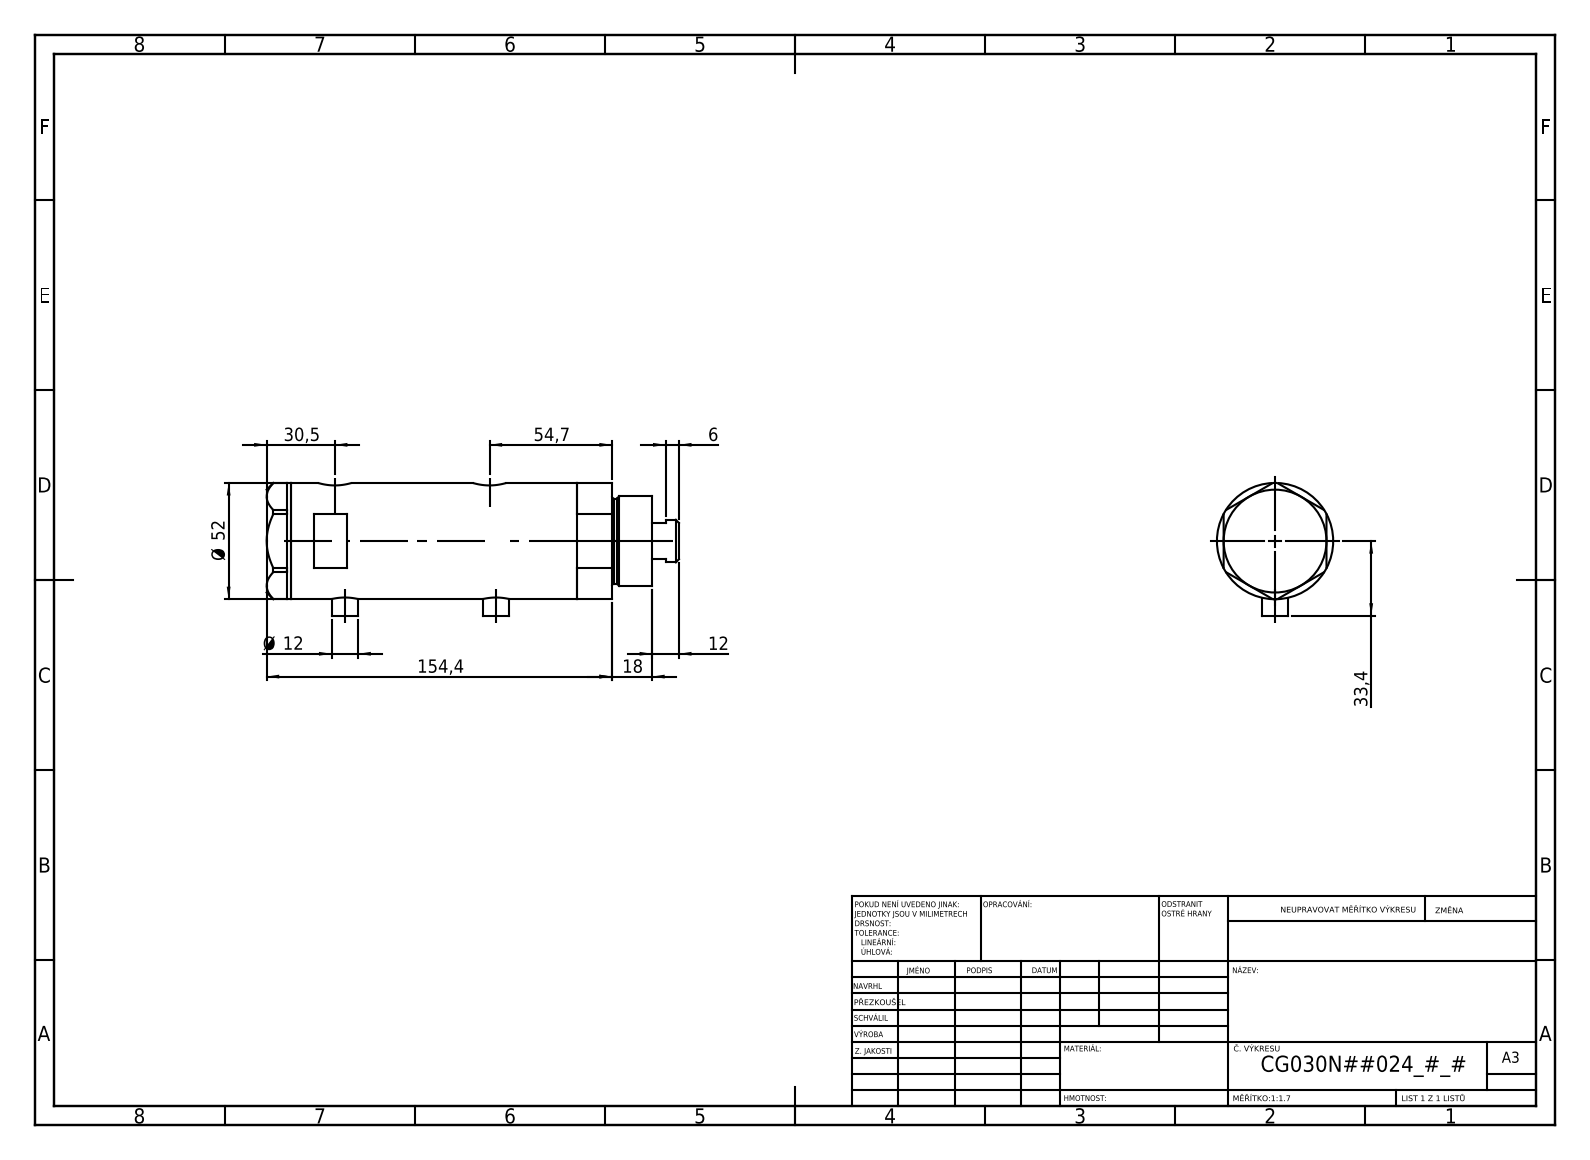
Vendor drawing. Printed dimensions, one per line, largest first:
154,4
54,7
Ø 52
33,4
30,5
18
12
Ø 12
6
